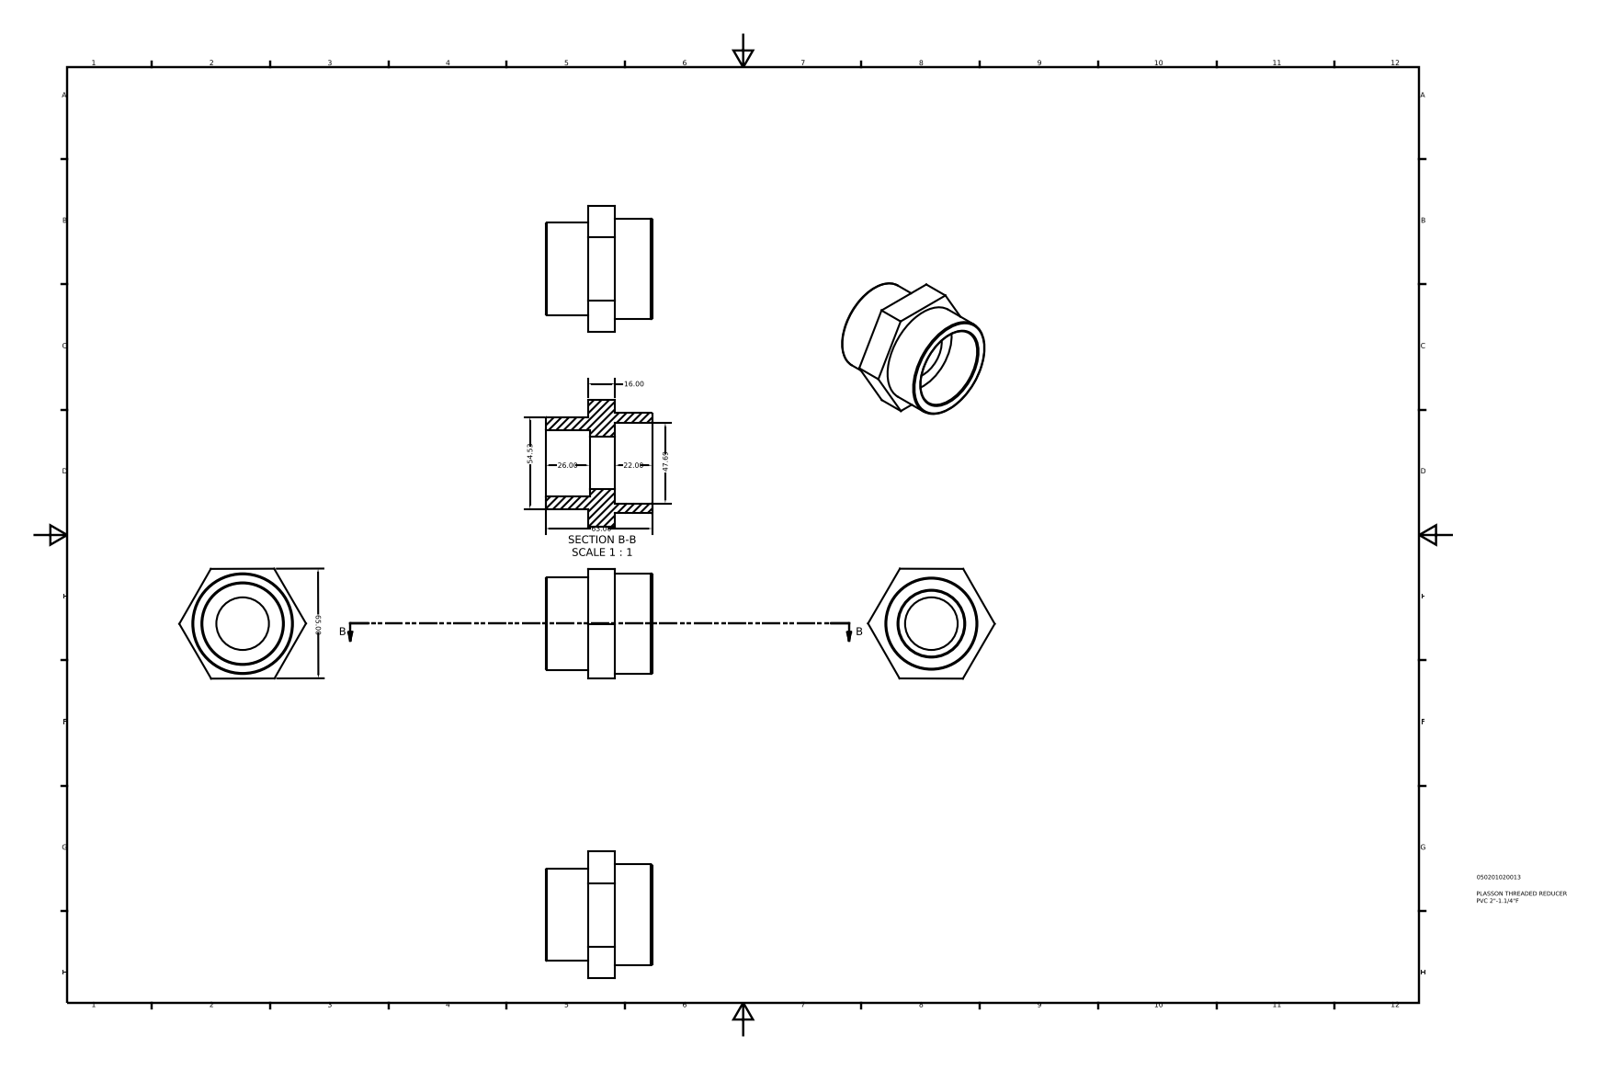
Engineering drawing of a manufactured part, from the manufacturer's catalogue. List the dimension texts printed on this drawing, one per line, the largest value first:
65.00
63.00
54.53
47.69
26.00
22.00
16.00
